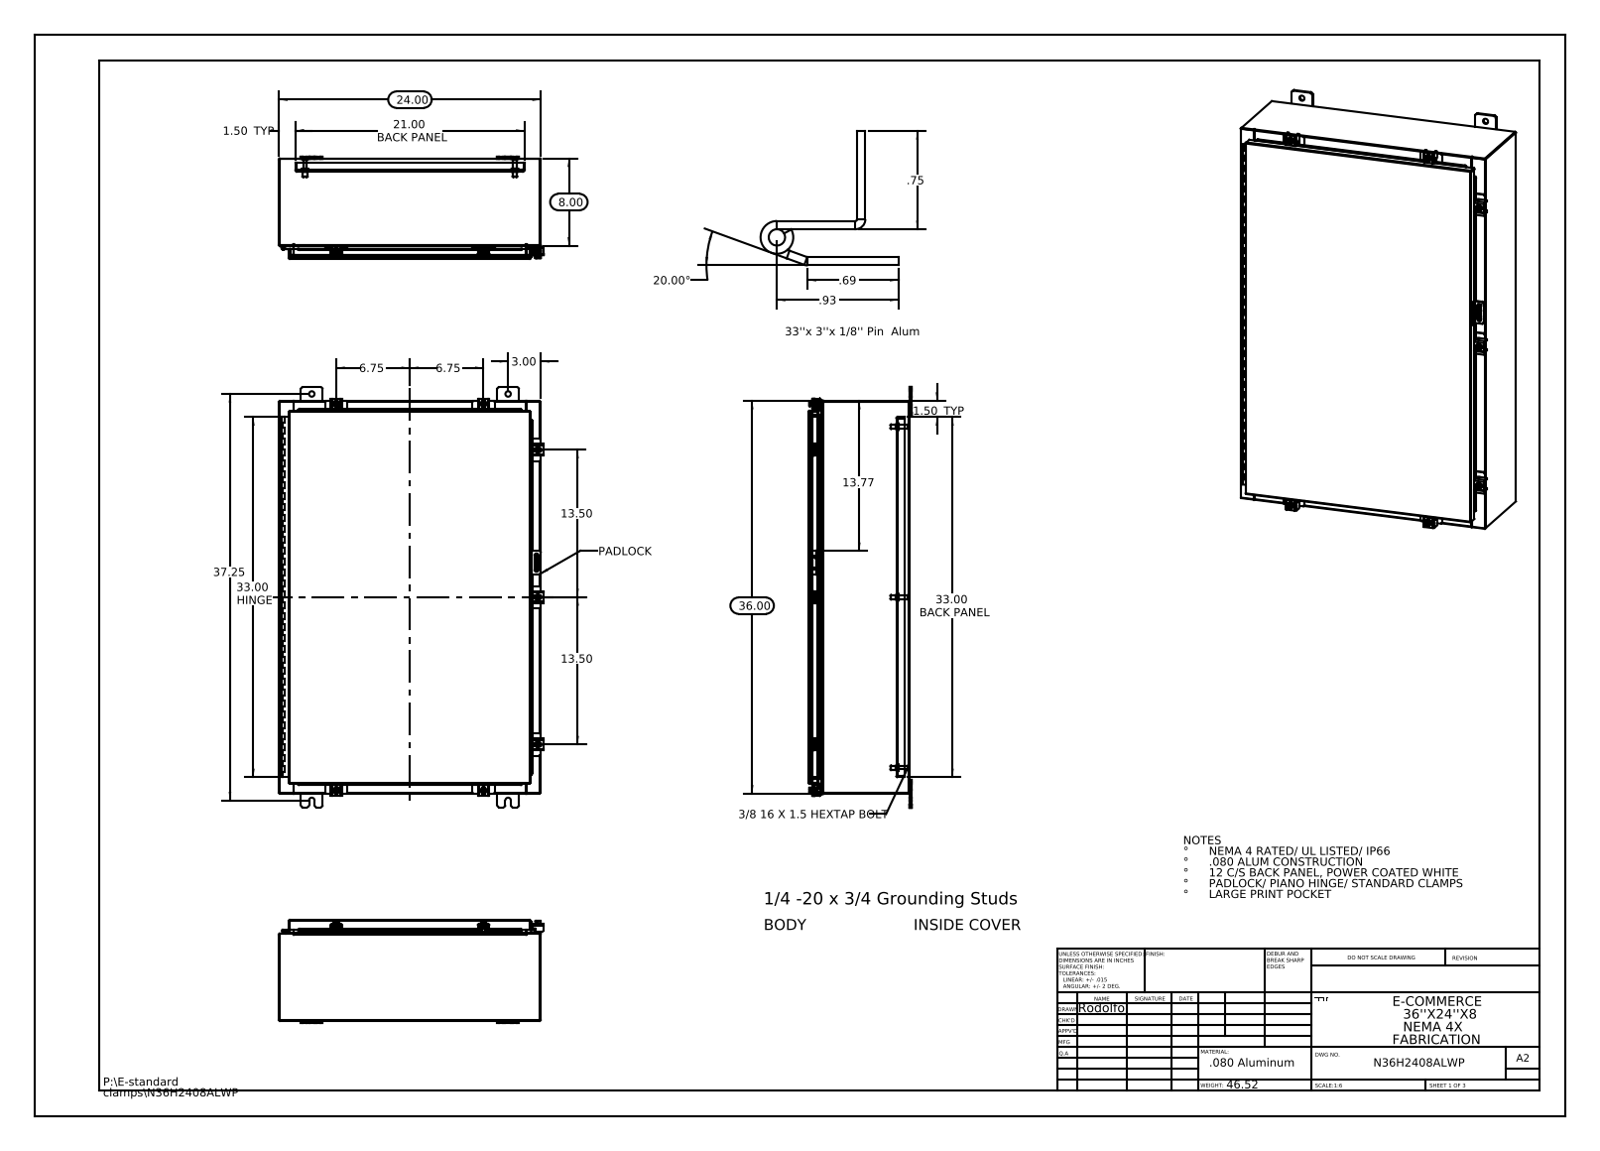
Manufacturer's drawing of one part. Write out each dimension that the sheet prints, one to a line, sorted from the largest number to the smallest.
37.25
36.00
33.00 HINGE
33.00 BACK PANEL
24.00
21.00 BACK PANEL
20.00°
13.77
13.50
13.50
8.00
6.75
6.75
3.00
1.50 TYP
1.50 TYP
.93
.75
.69
